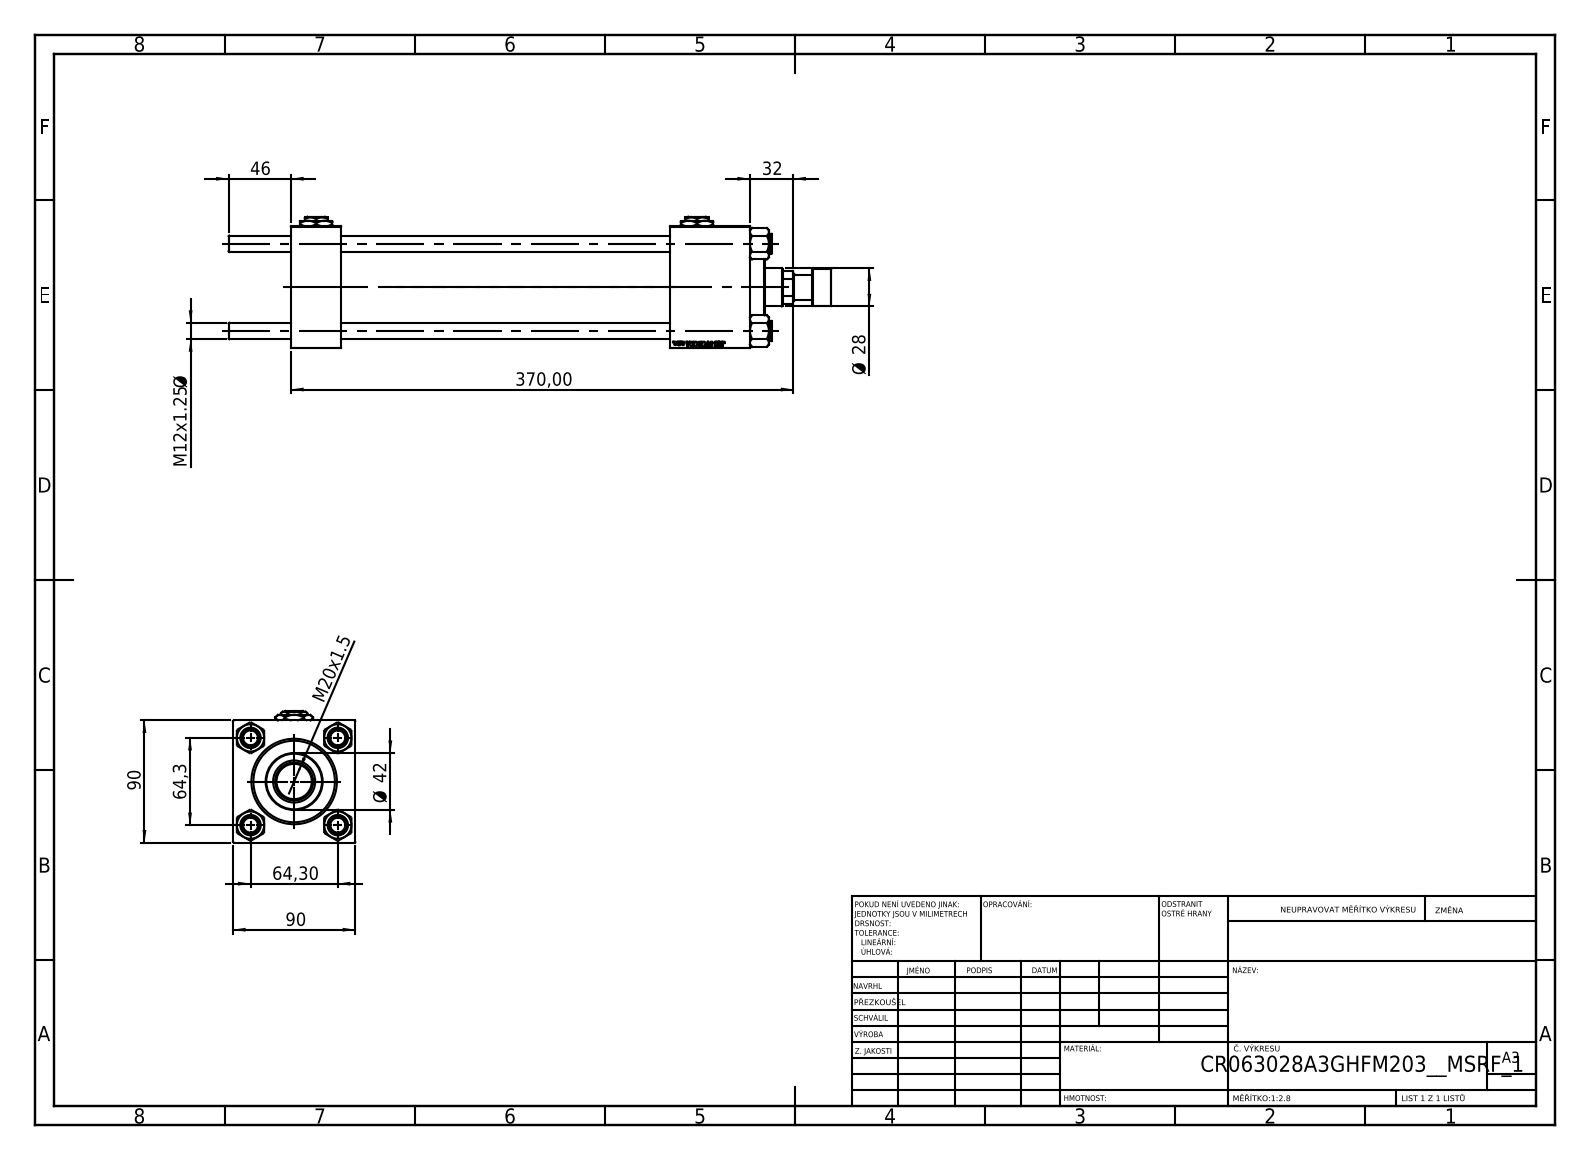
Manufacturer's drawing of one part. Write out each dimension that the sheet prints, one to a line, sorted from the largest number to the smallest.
370,00
90
90
64,3
64,30
46
Ø 42
32
Ø 28
M20x1.5
M12x1.25 Ø
